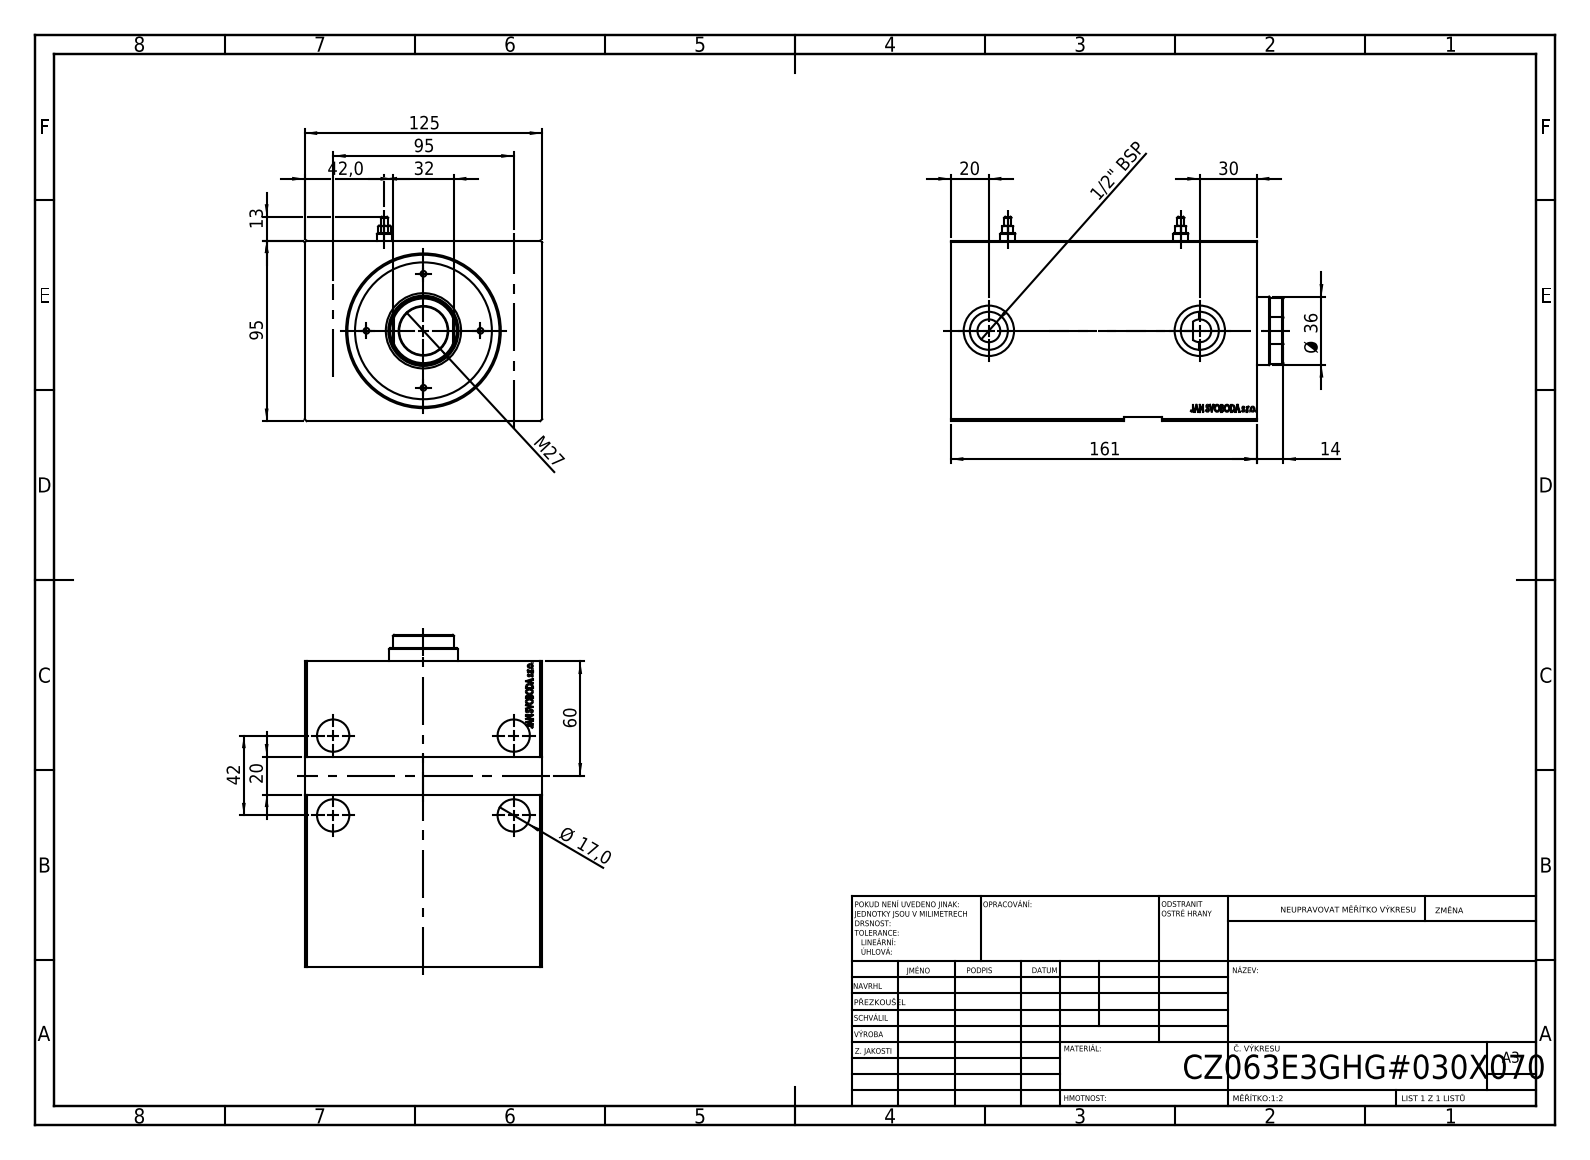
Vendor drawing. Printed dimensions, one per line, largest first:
161
125
95
95
60
42,0
42
Ø 36
32
30
M27
20
20
Ø 17,0
14
13
1/2" BSP
